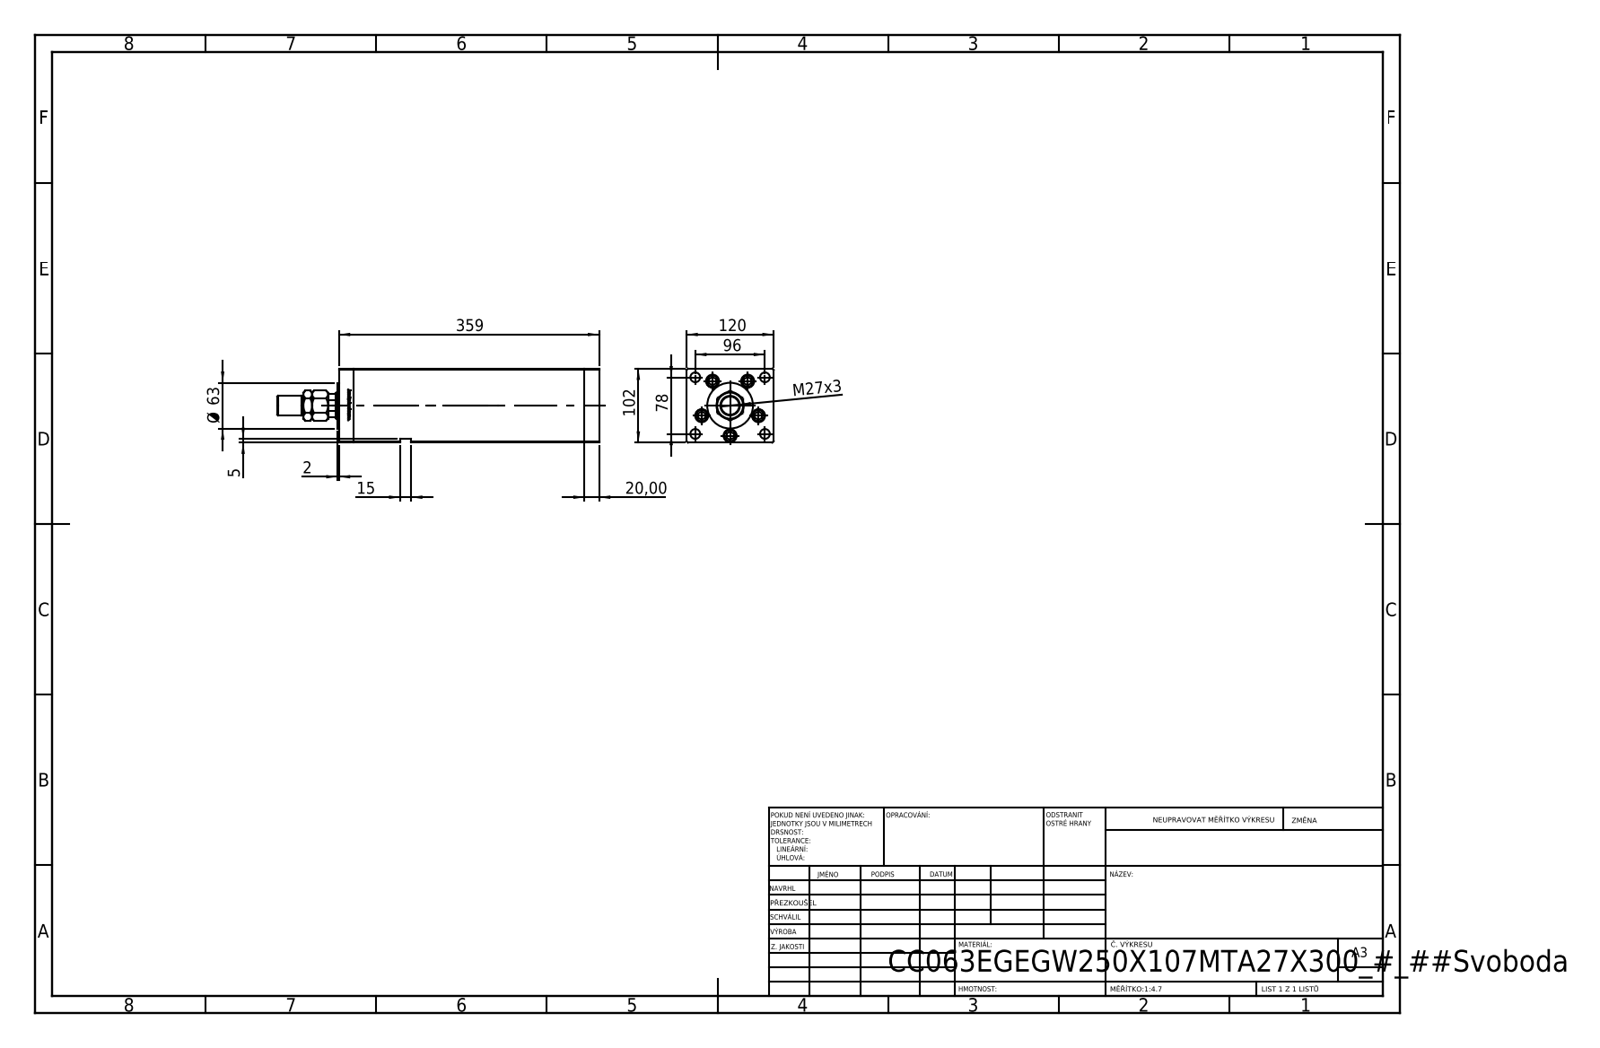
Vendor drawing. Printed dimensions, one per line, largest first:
359
120
102
96
78
Ø 63
M27x3
20,00
15
5
2
